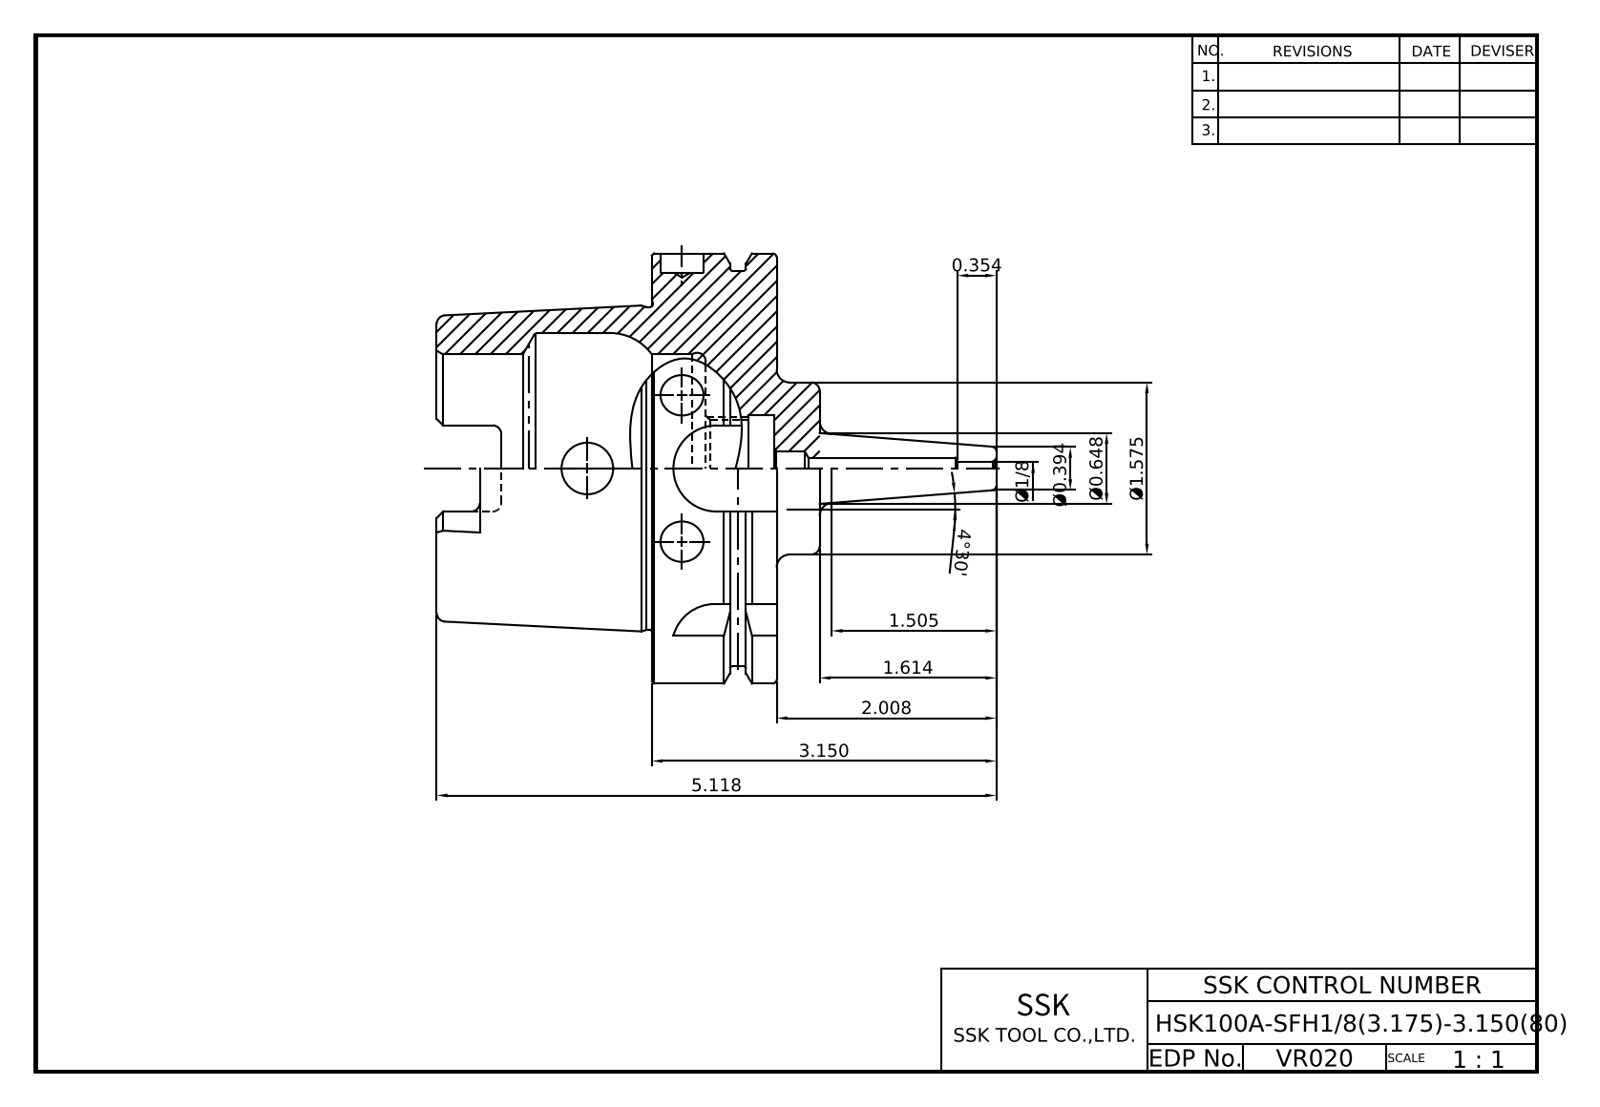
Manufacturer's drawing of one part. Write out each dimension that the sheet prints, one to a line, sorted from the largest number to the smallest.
5.118
4°30'
3.150
2.008
1.614
Ø1.575
1.505
Ø0.648
Ø0.394
0.354
